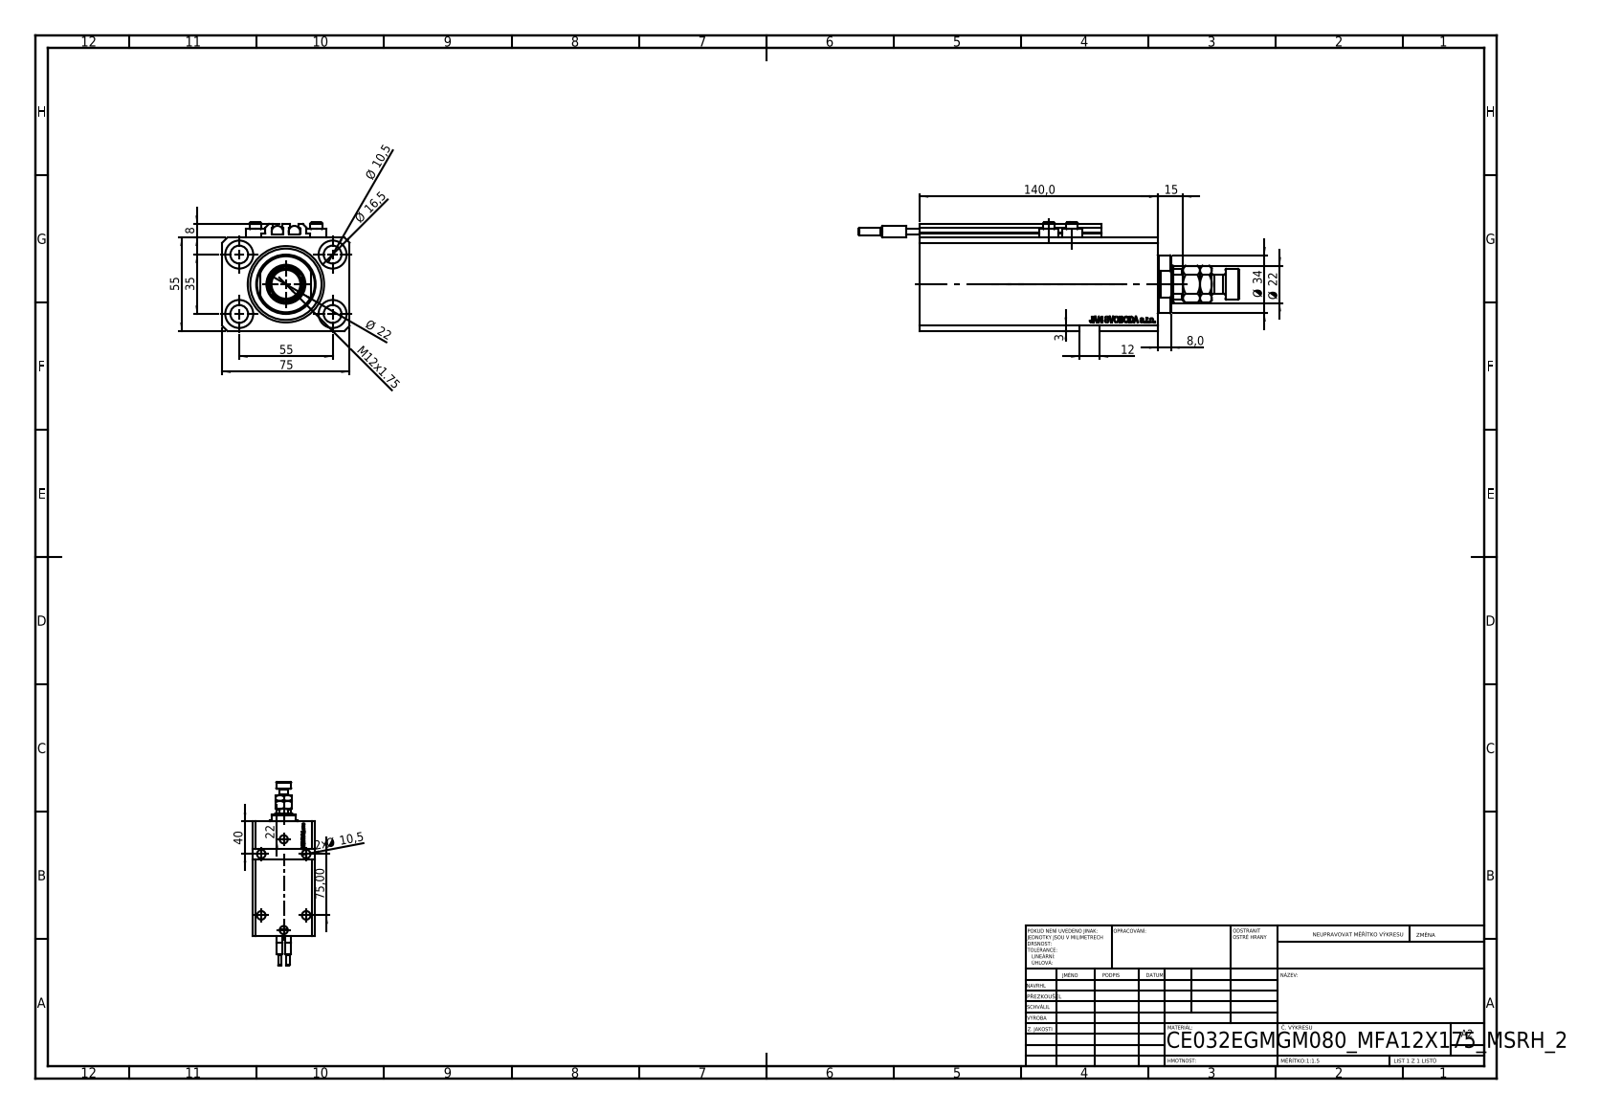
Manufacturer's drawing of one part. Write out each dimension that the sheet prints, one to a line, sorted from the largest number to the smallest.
140,0
75
75,00
55
55
40
35
Ø 34
Ø 22
Ø 22
22
Ø 16,5
15
M12x1.75
12
Ø 10,5
2x Ø 10,5
8
8,0
3
